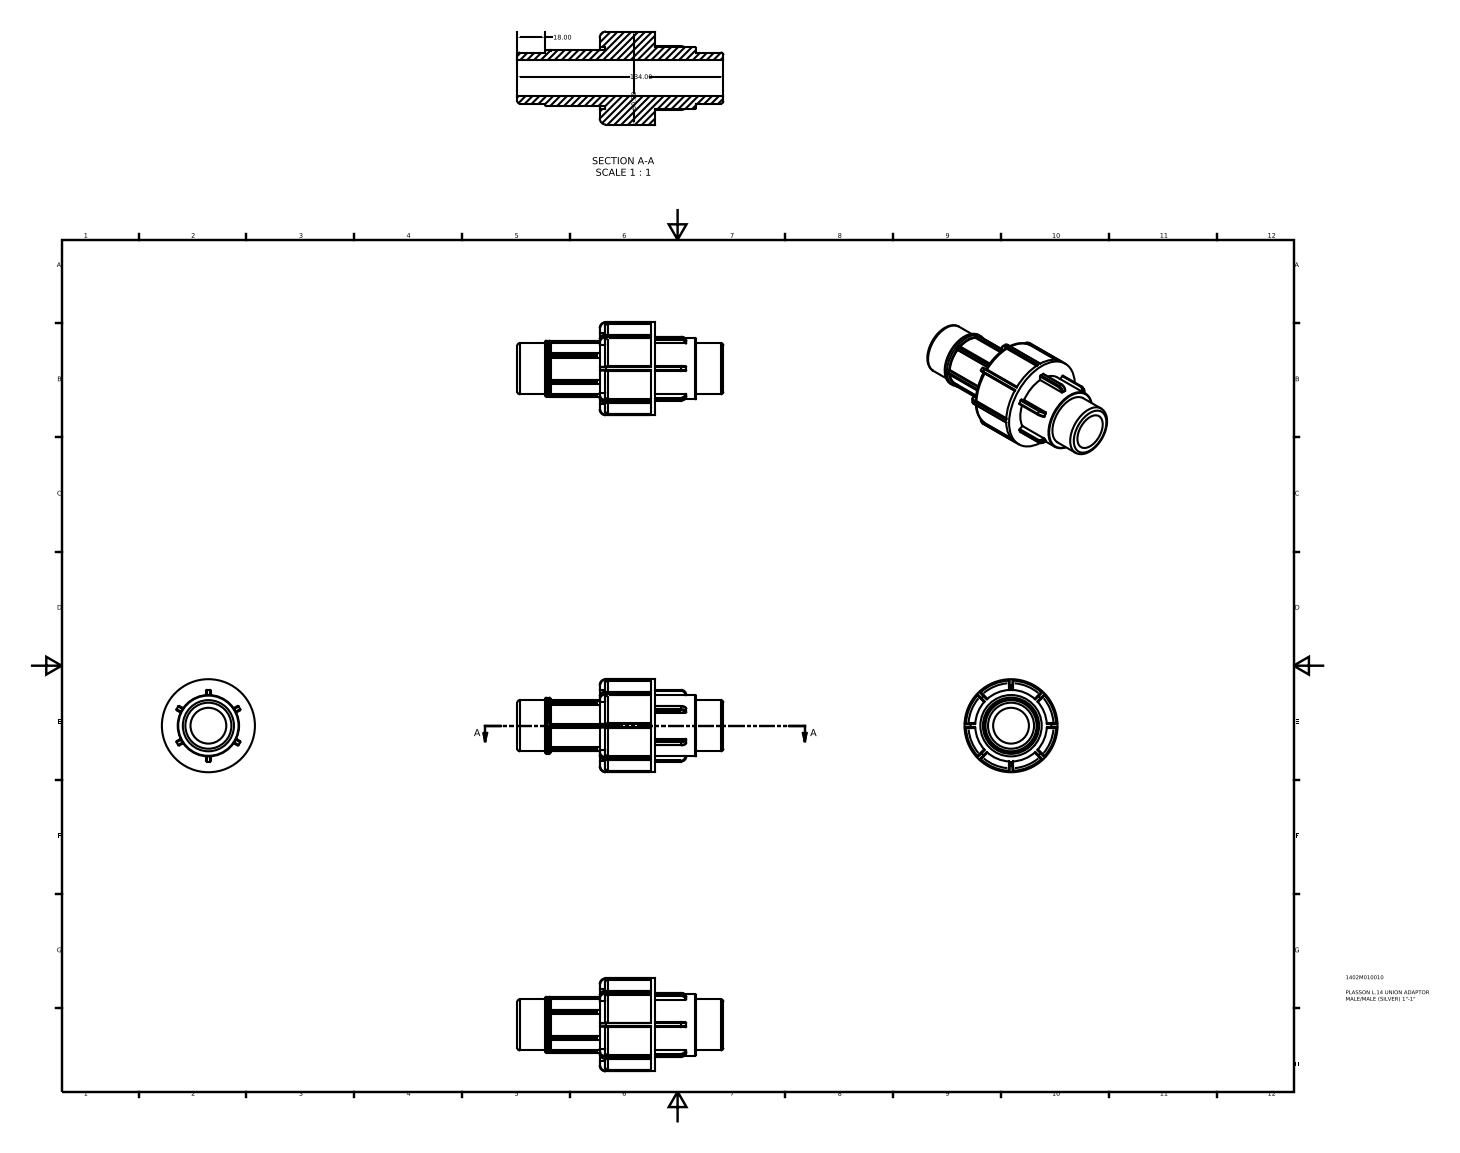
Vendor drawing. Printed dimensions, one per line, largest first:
134.00
60.50
18.00
